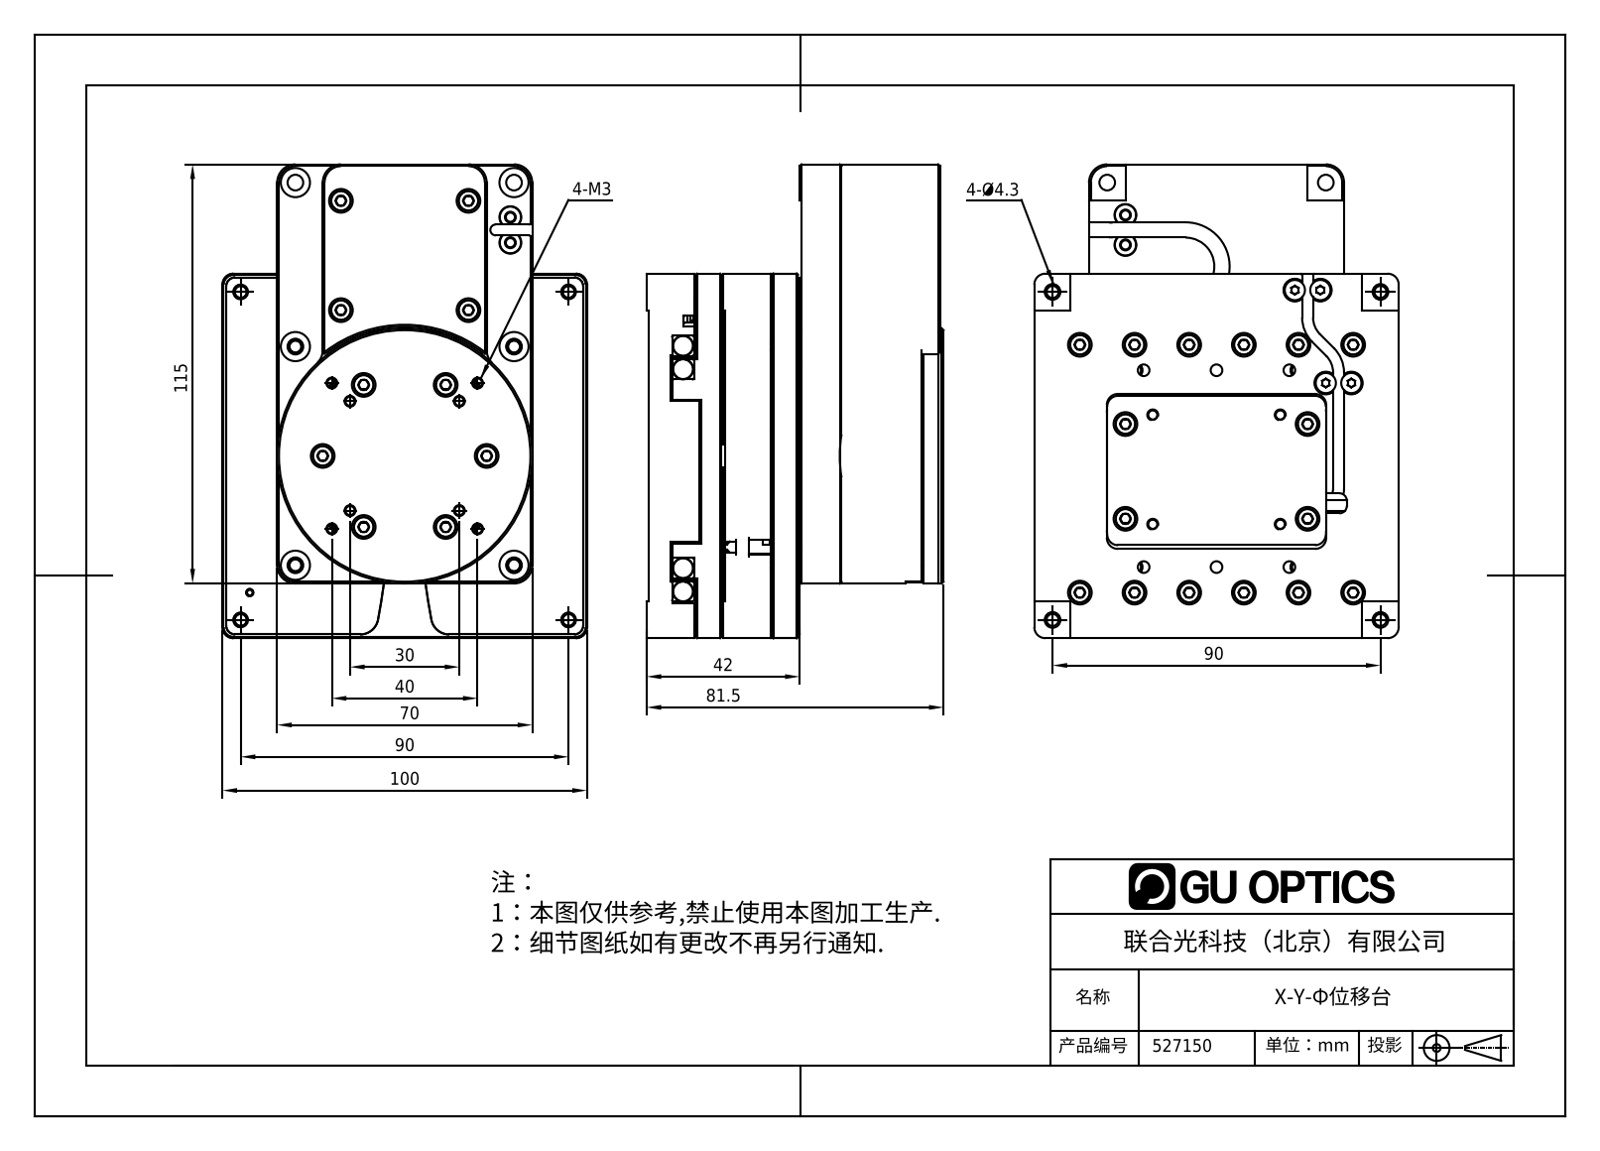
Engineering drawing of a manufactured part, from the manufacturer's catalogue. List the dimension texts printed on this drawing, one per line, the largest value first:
115
100
90
90
81.5
70
42
40
30
